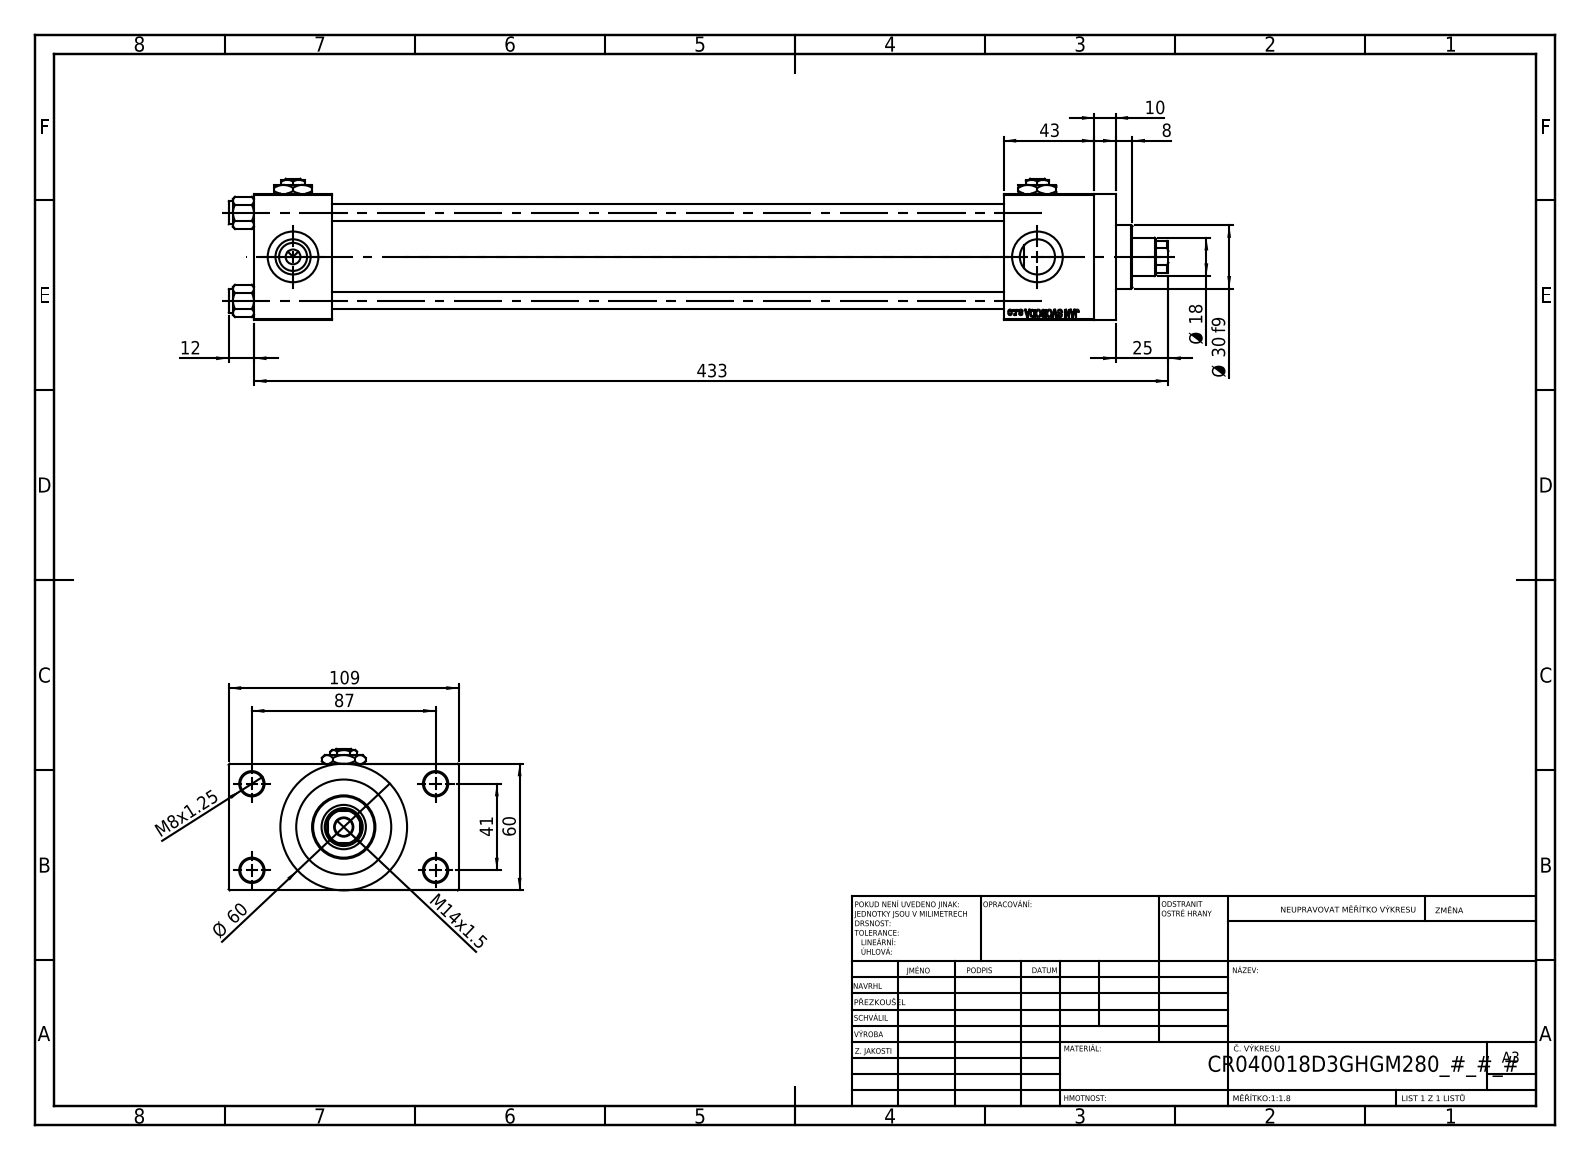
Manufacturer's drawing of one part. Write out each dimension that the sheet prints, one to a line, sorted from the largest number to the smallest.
433
109
87
Ø 60
60
43
41
Ø 30 f9
25
Ø 18
M14x1.5
12
10
8
M8x1.25
